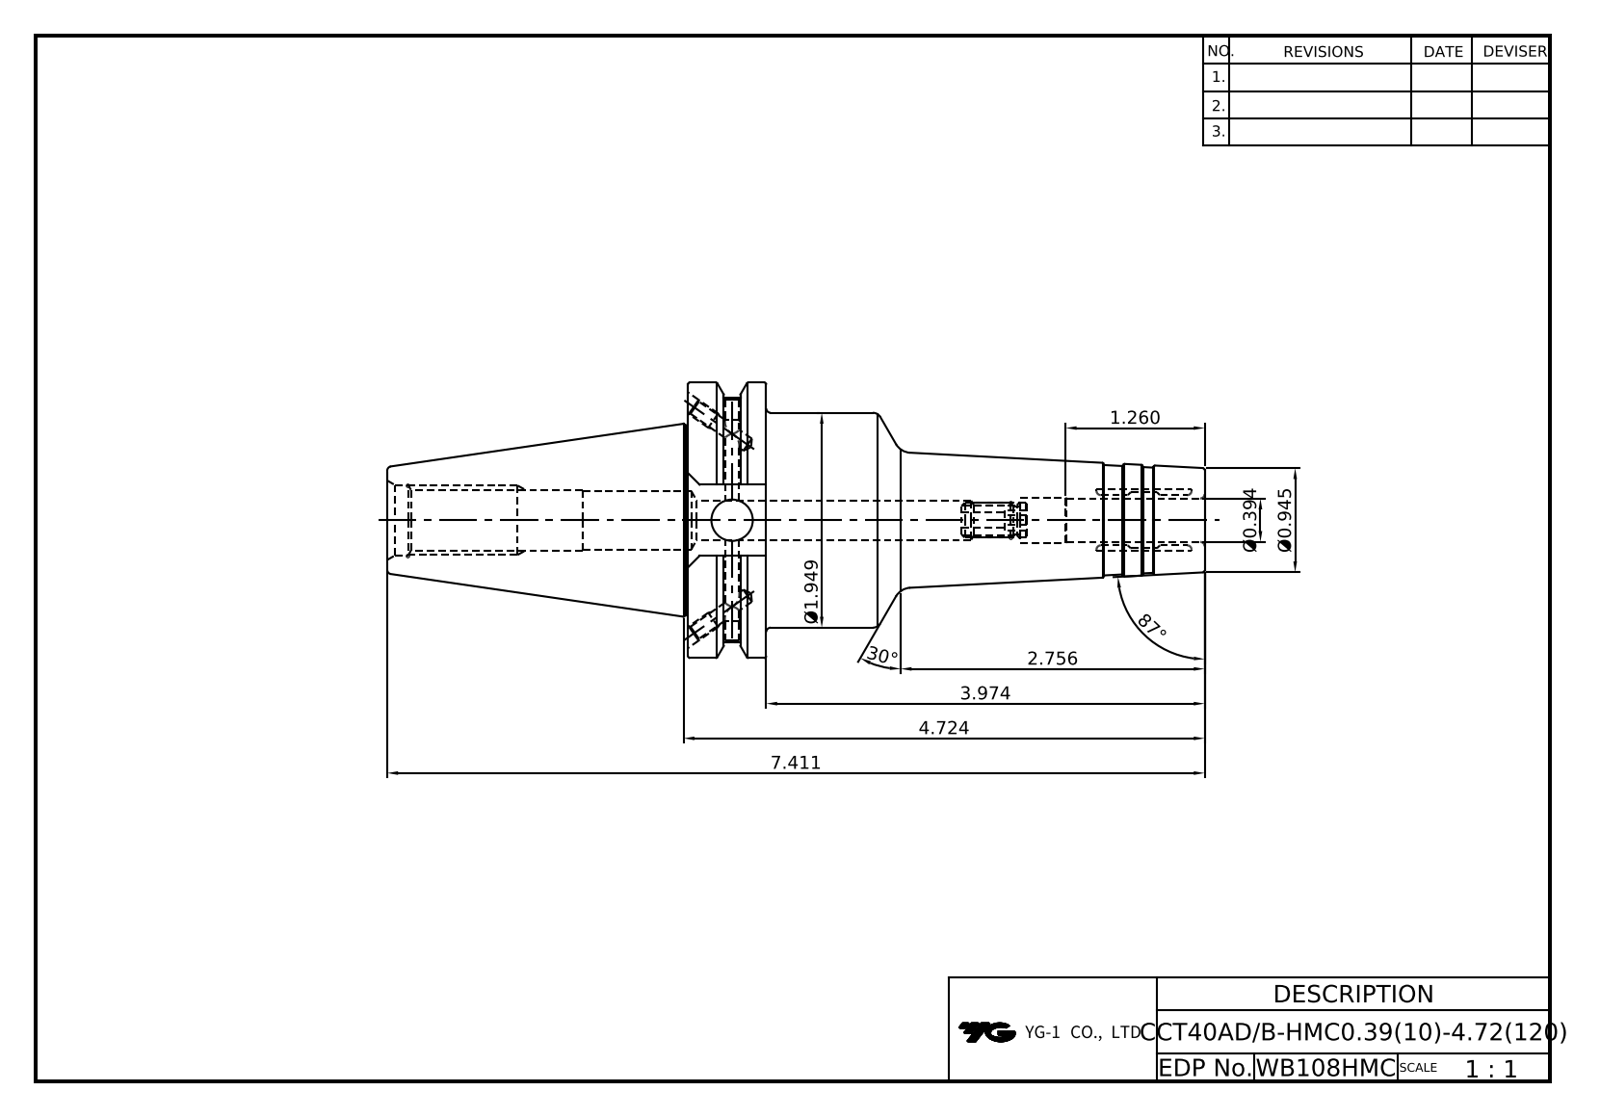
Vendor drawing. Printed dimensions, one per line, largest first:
87°
30°
7.411
4.724
3.974
2.756
Ø1.949
1.260
Ø0.945
Ø0.394
